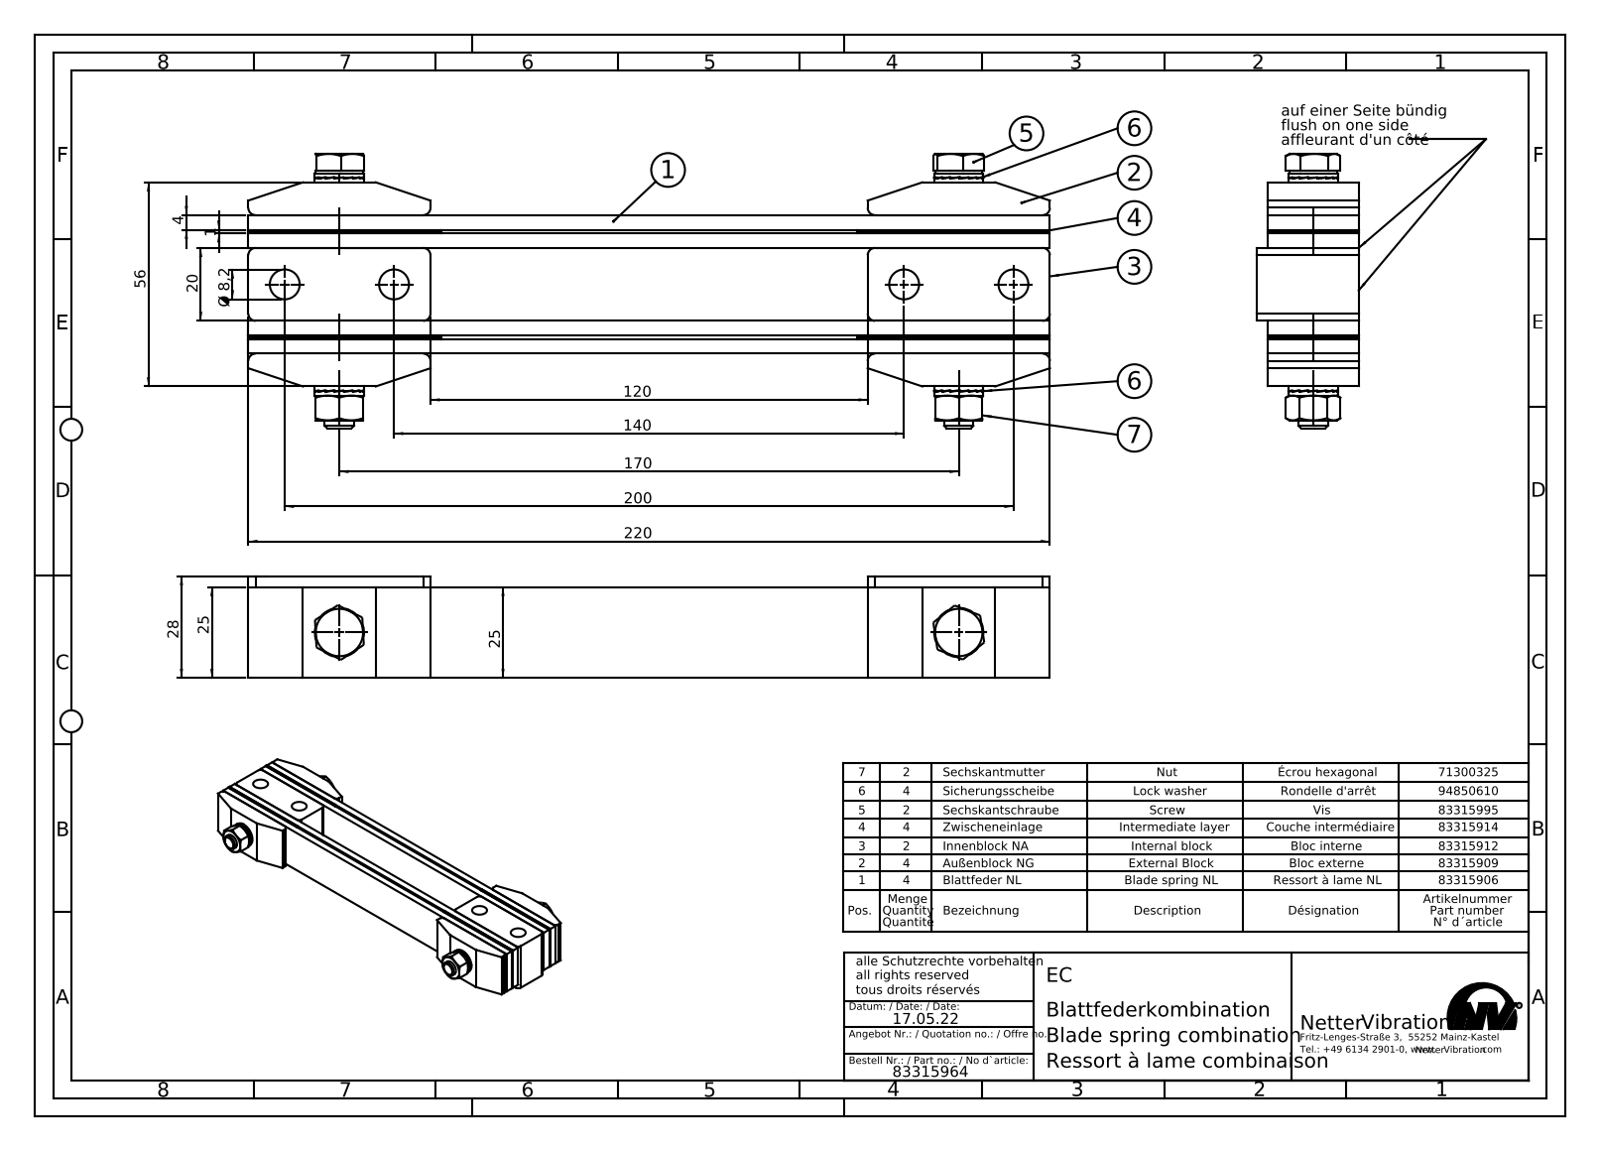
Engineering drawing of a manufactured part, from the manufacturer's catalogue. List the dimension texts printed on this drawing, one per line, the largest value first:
220
200
170
140
120
56
28
25
25
20
Ø 8,2
4
1
